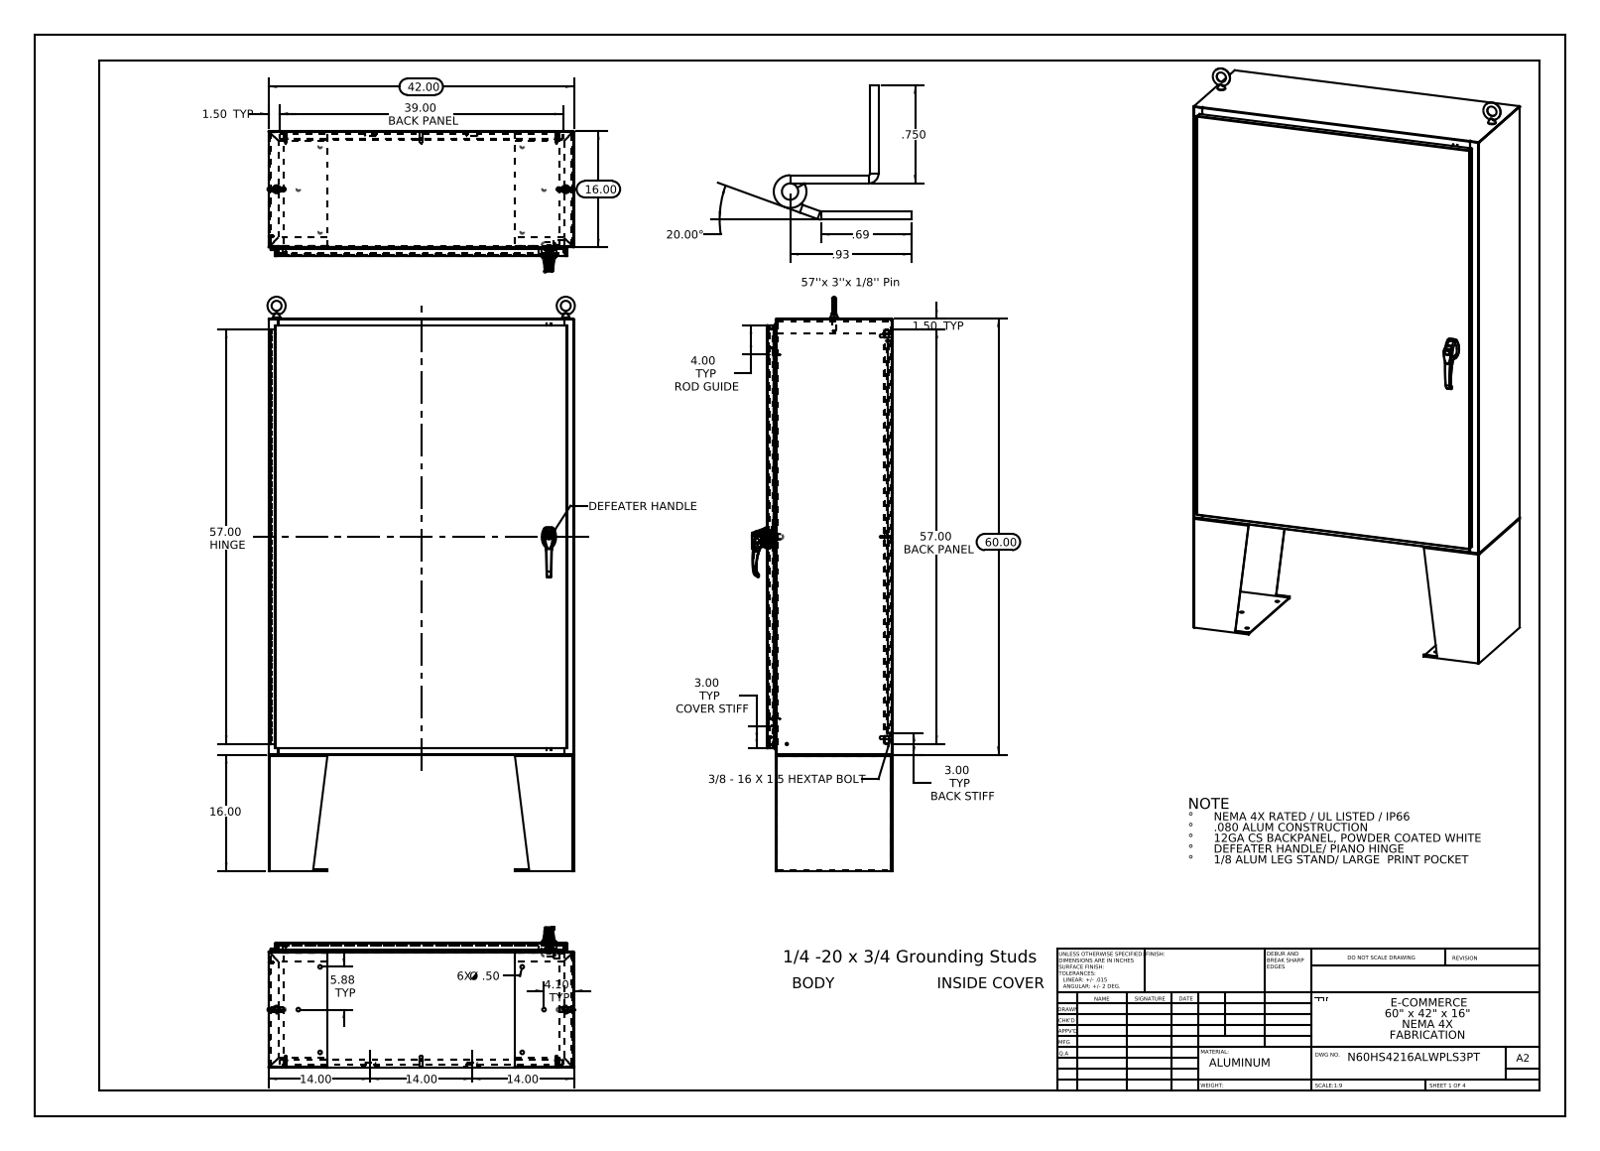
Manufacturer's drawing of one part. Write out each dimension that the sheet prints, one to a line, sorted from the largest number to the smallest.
60.00
57.00 HINGE
57.00 BACK PANEL
42.00
39.00 BACK PANEL
20.00°
16.00
16.00
14.00
14.00
14.00
5.88 TYP
4.10 TYP
4.00 TYP ROD GUIDE
3.00 TYP COVER STIFF
3.00 TYP BACK STIFF
1.50 TYP
1.50 TYP
.93
.750
.69
6X Ø .50
